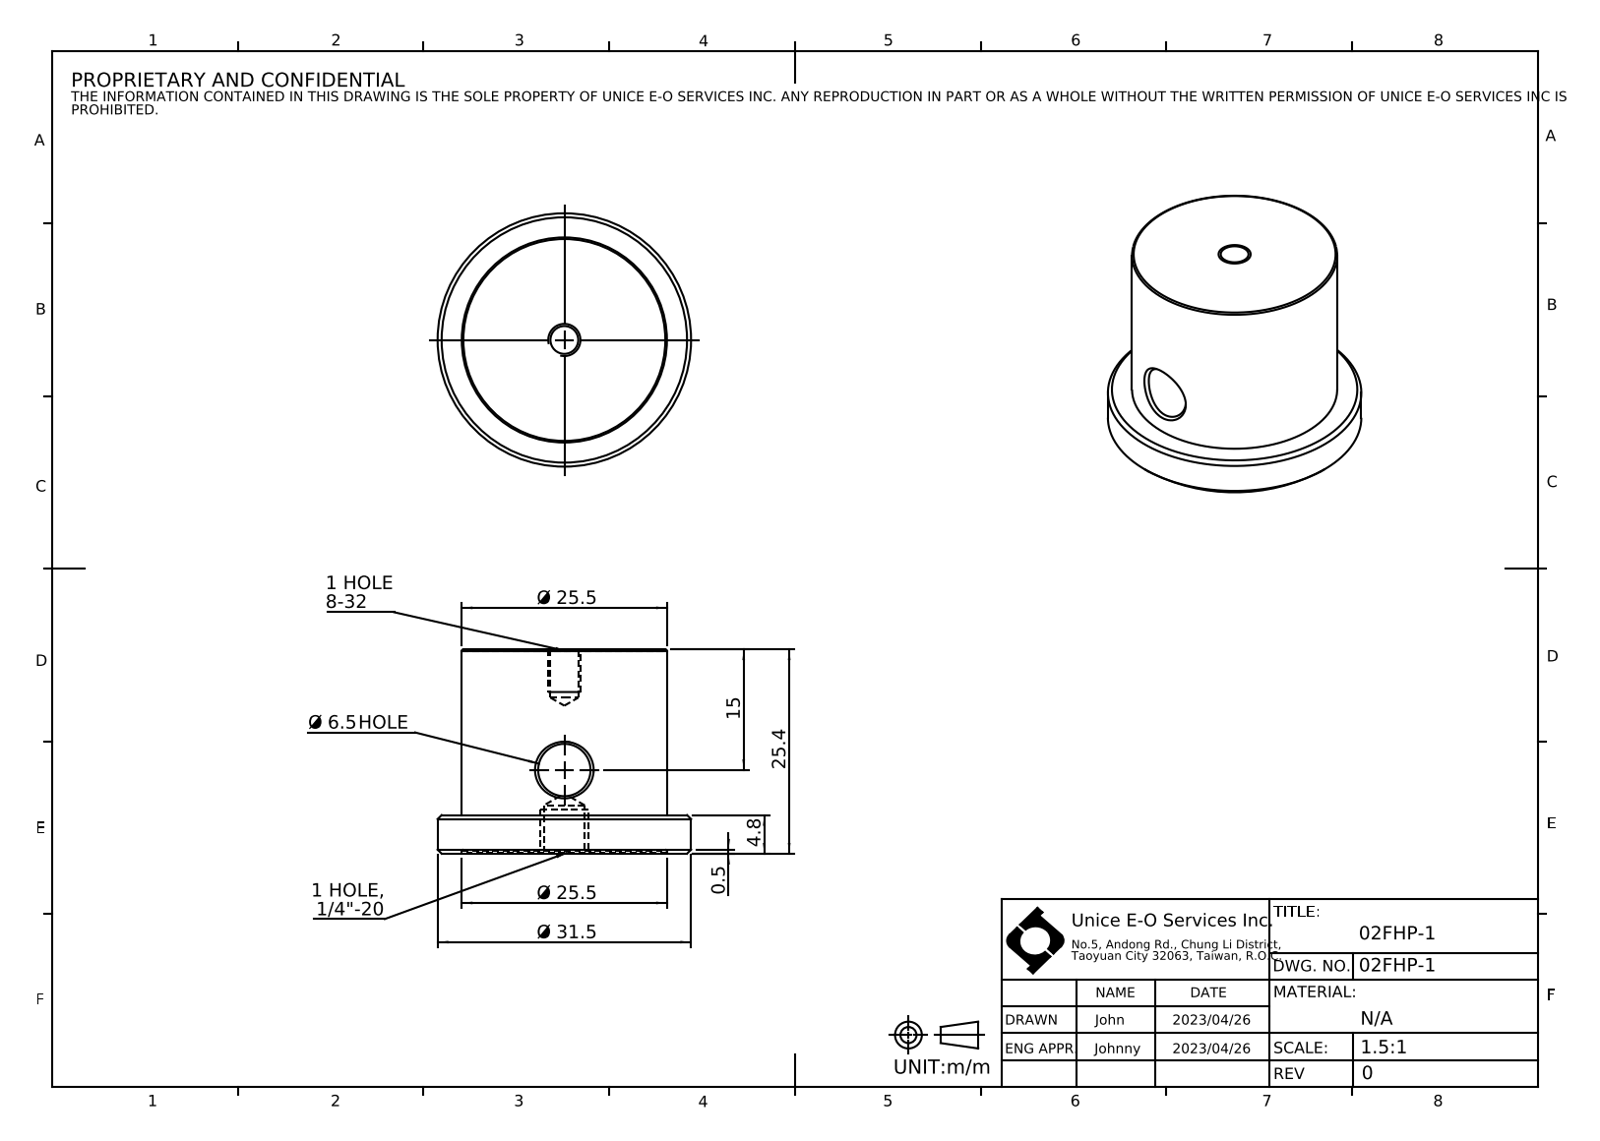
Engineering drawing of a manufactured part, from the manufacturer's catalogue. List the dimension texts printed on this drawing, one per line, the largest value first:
Ø 31.5
Ø 25.5
Ø 25.5
25.4
15
Ø 6.5 HOLE
4.8
0.5
